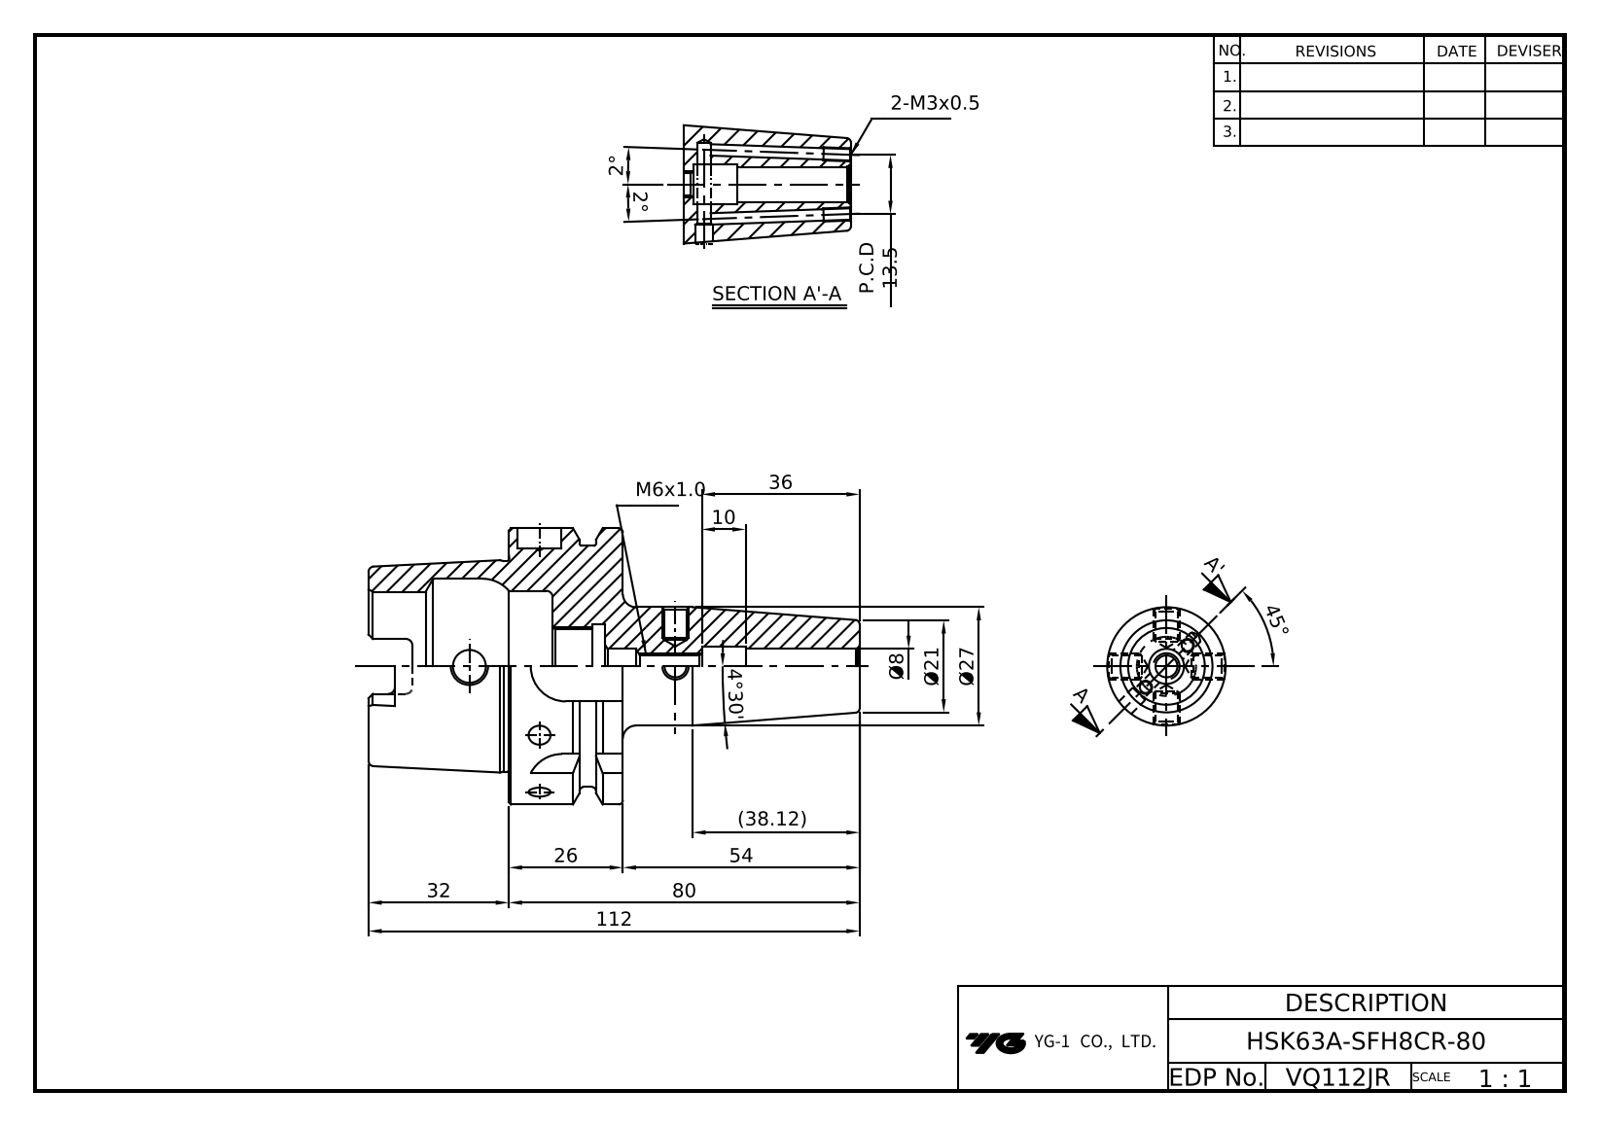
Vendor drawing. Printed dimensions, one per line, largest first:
112
80
54
45°
(38.12)
36
32
Ø27
26
Ø21
P.C.D 13.5
10
Ø8
4°30'
2°
2°
